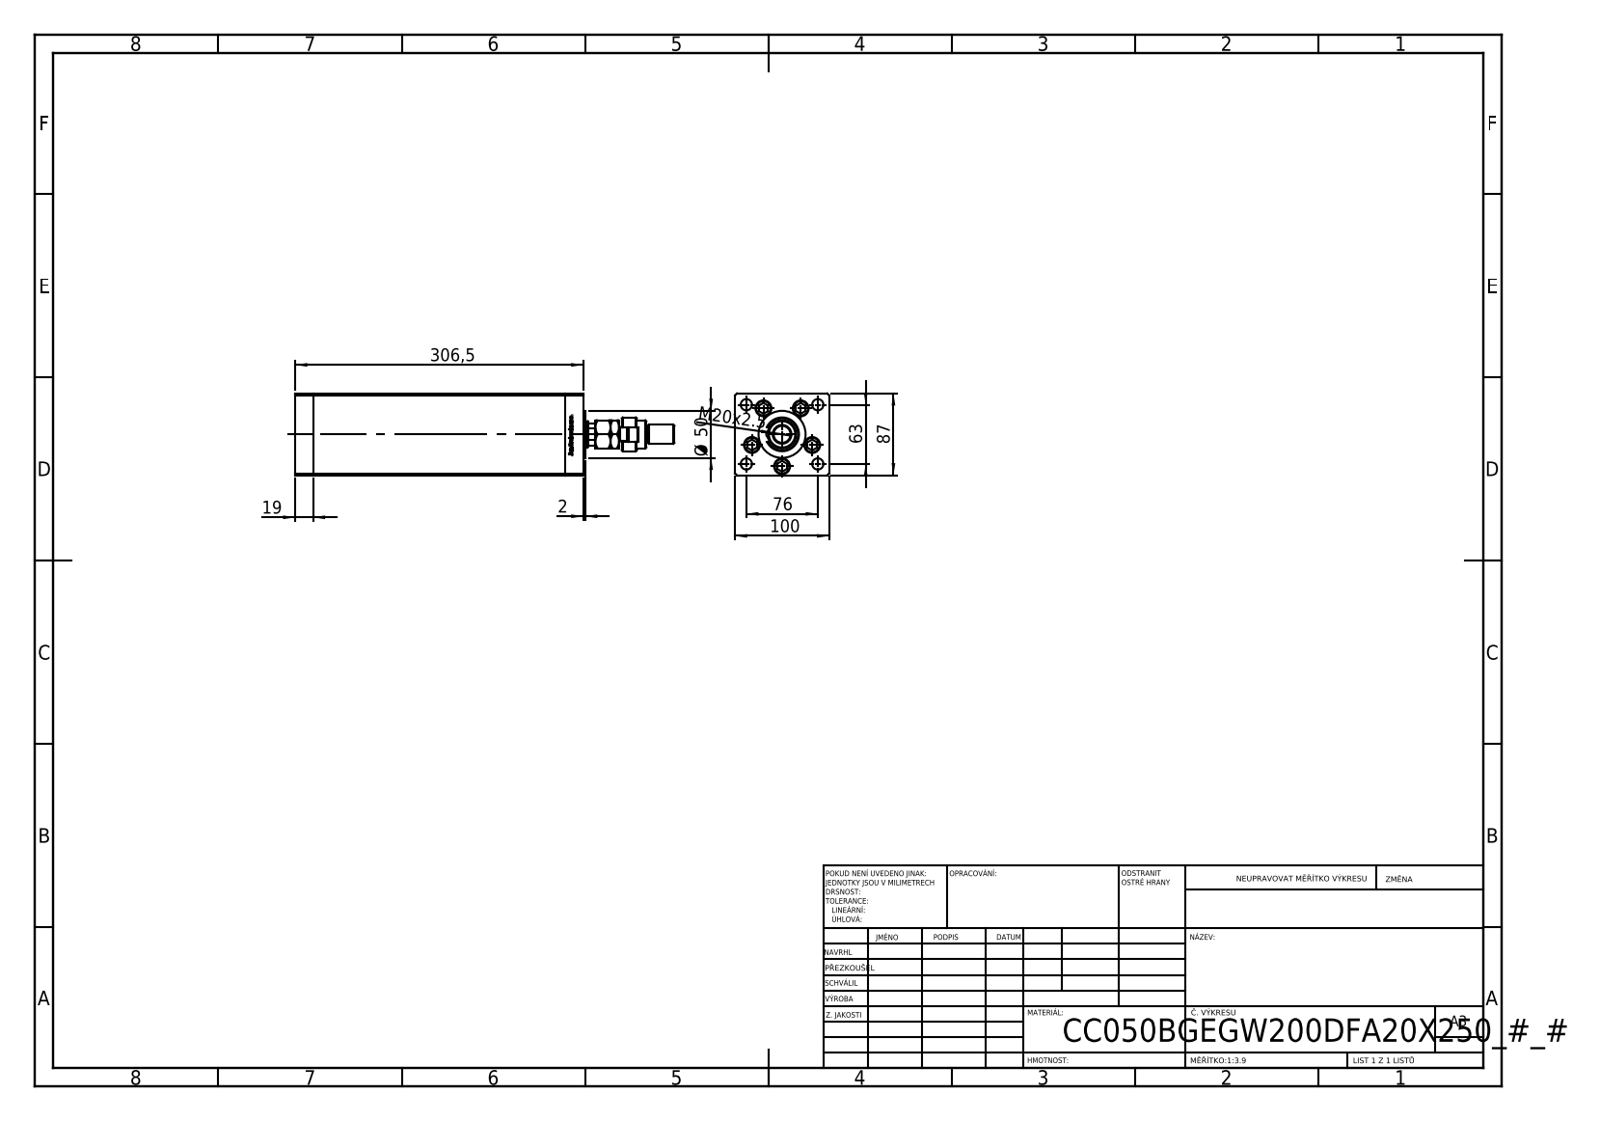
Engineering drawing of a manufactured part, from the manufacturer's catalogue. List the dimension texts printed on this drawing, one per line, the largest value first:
306,5
100
87
76
63
Ø 50
M20x2.5
19
2
